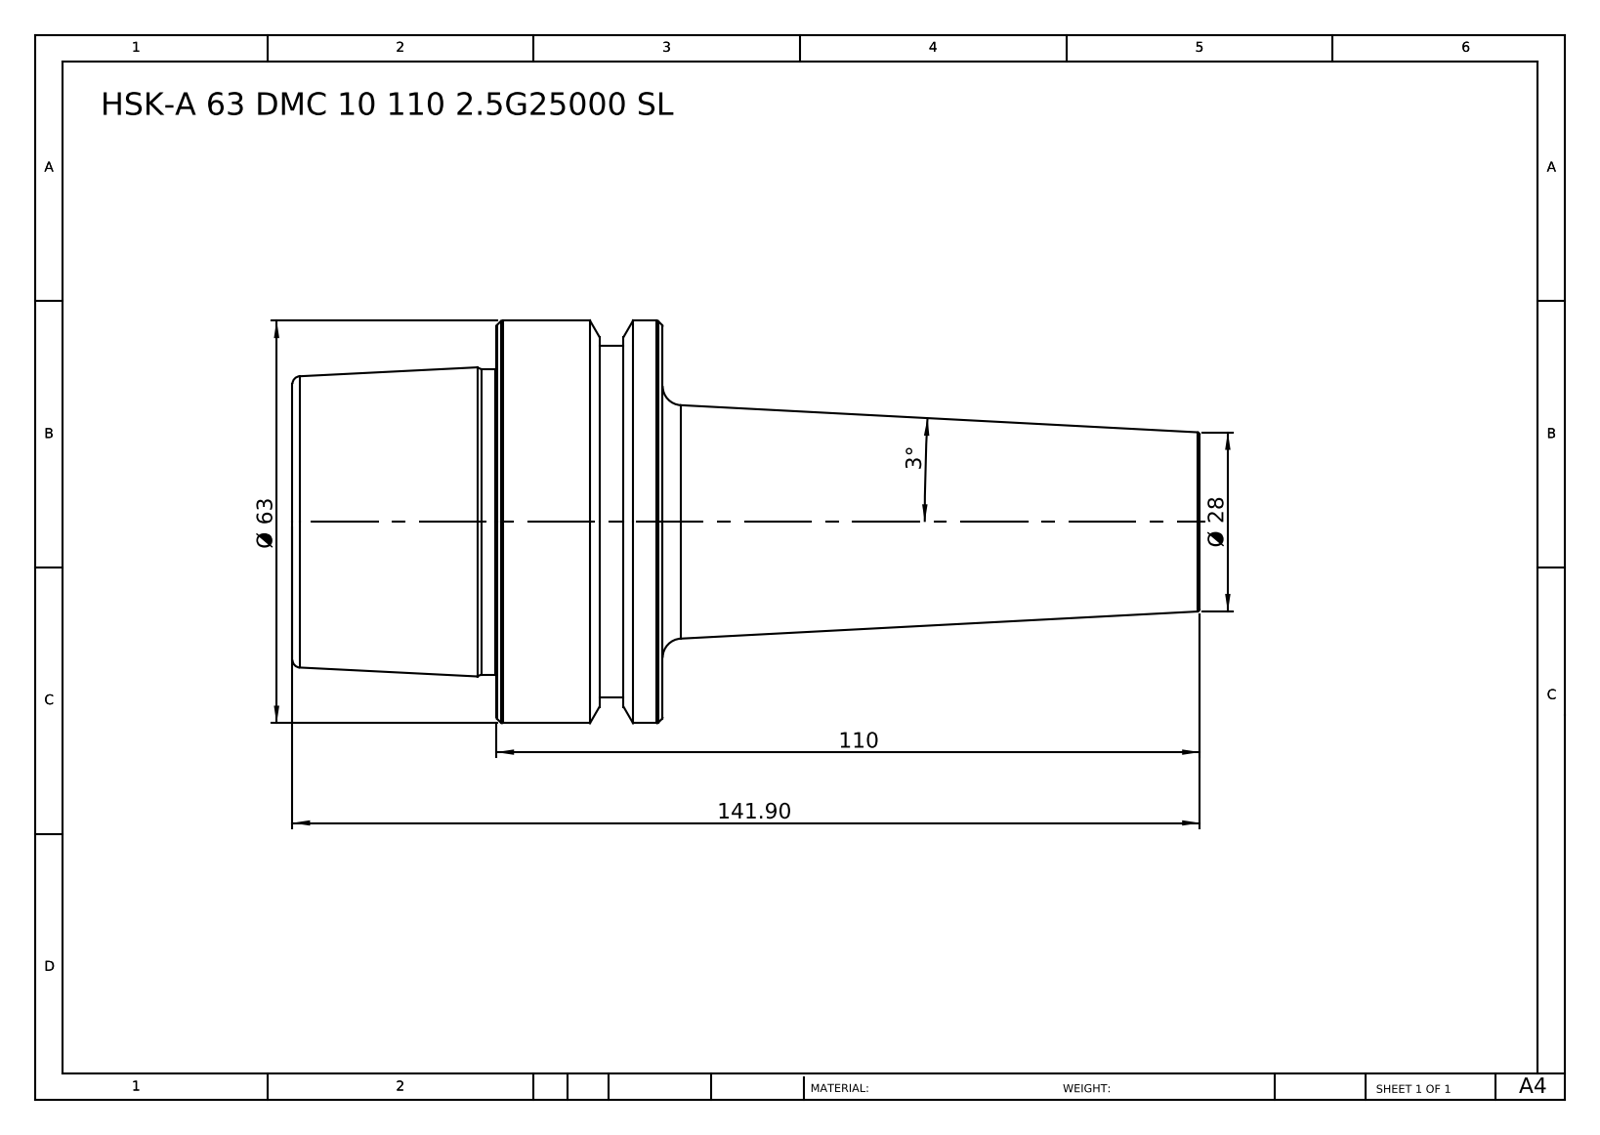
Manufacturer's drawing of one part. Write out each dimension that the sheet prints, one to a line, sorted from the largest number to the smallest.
141.90
110
Ø 63
Ø 28
3°
